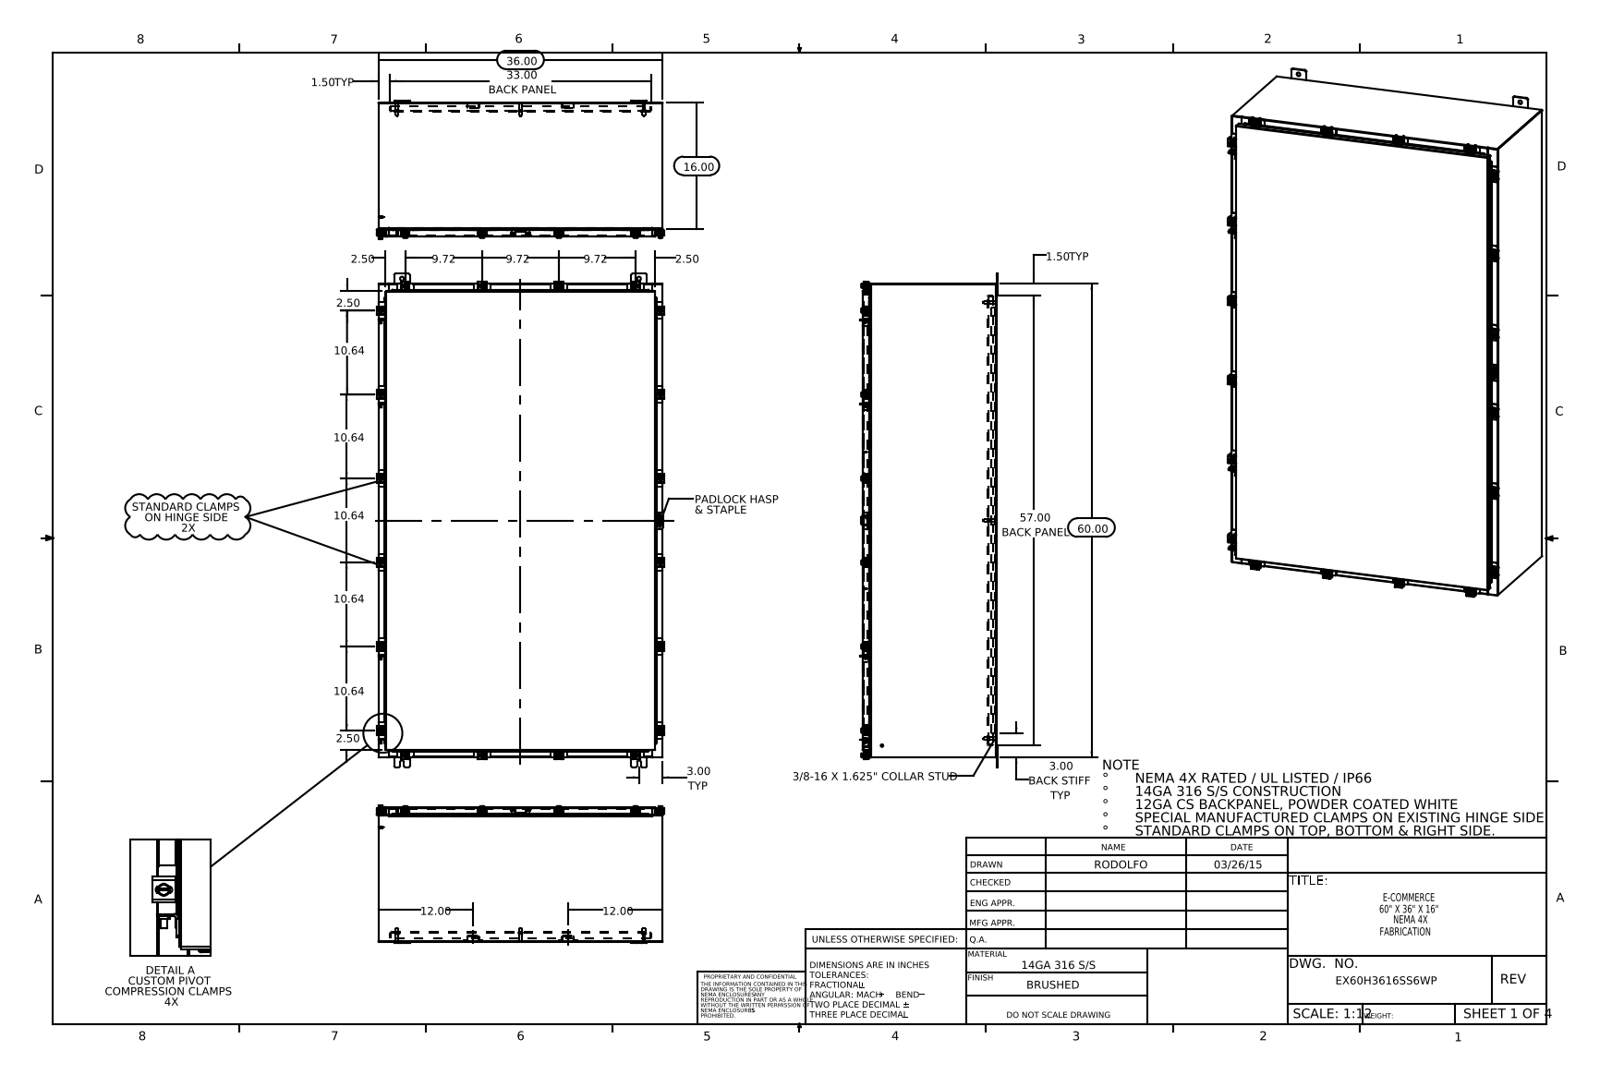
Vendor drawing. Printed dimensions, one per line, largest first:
60.00
57.00 BACK PANEL
36.00
33.00 BACK PANEL
16.00
12.00
12.00
10.64
10.64
10.64
10.64
10.64
9.72
9.72
9.72
3.00 TYP
3.00 BACK STIFF TYP
2.50
2.50
2.50
2.50
1.50 TYP
1.50 TYP
